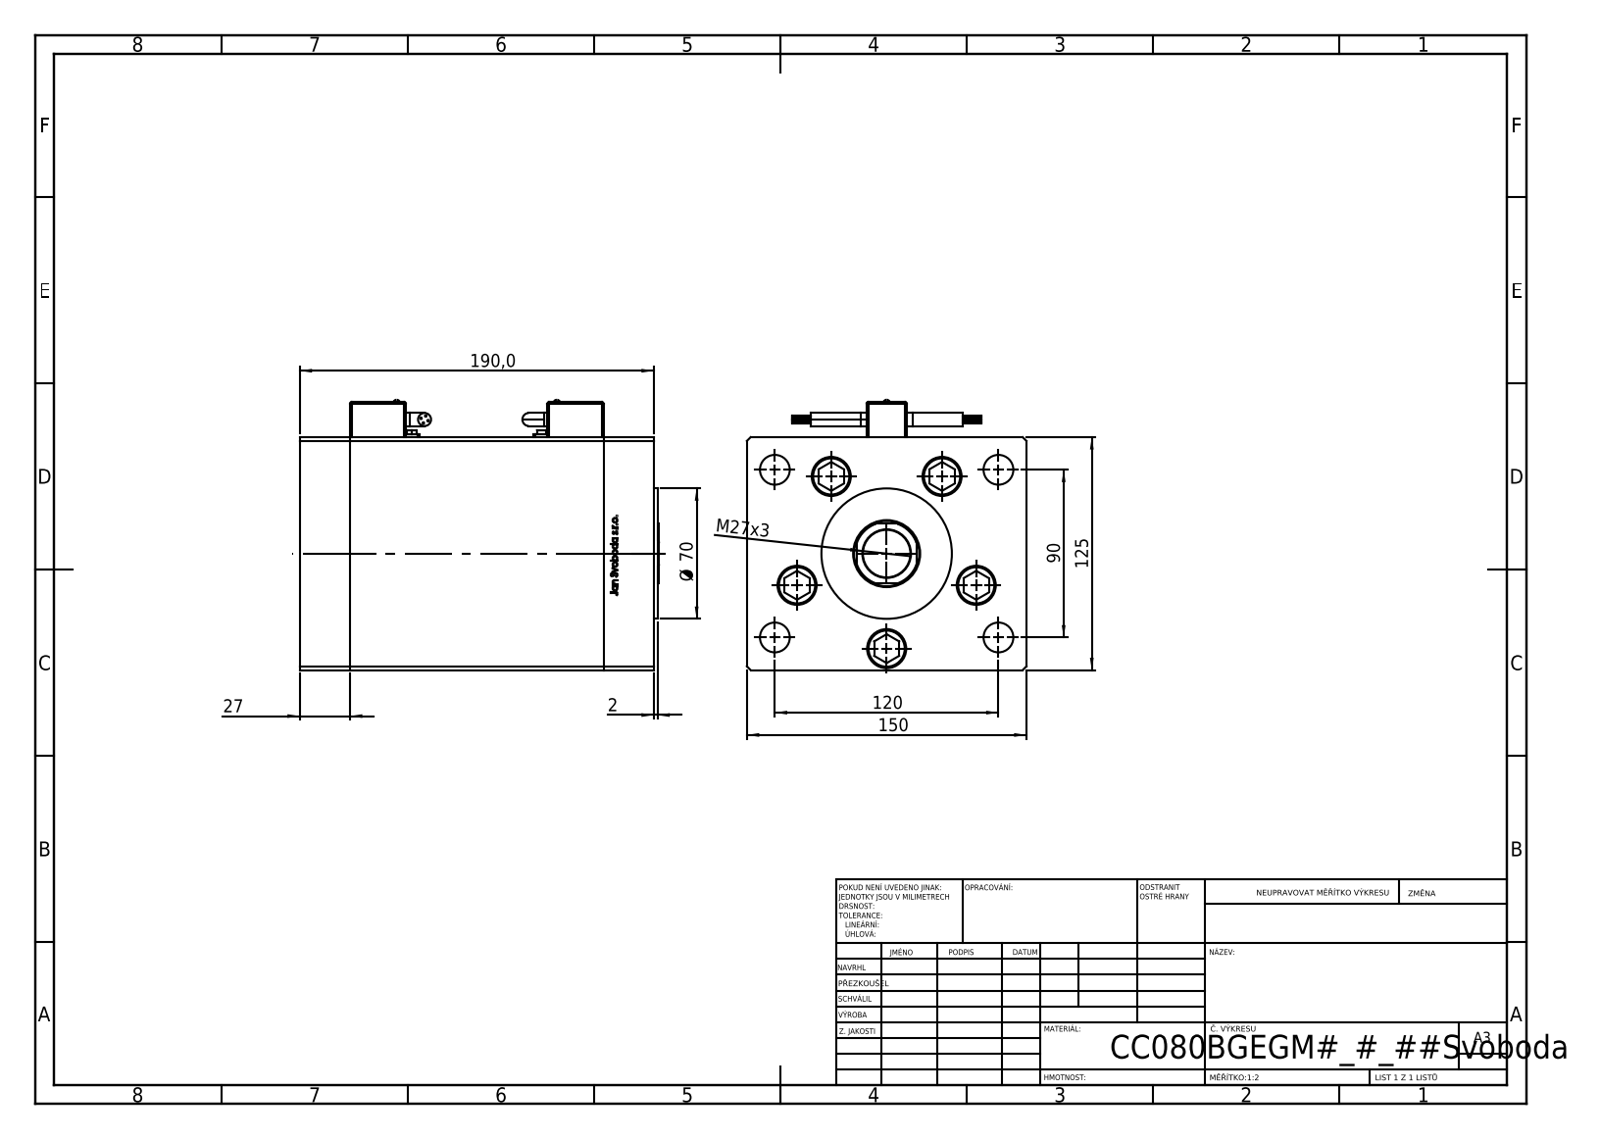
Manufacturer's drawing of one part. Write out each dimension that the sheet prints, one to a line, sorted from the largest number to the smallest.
190,0
150
125
120
90
Ø 70
27
M27x3
2
